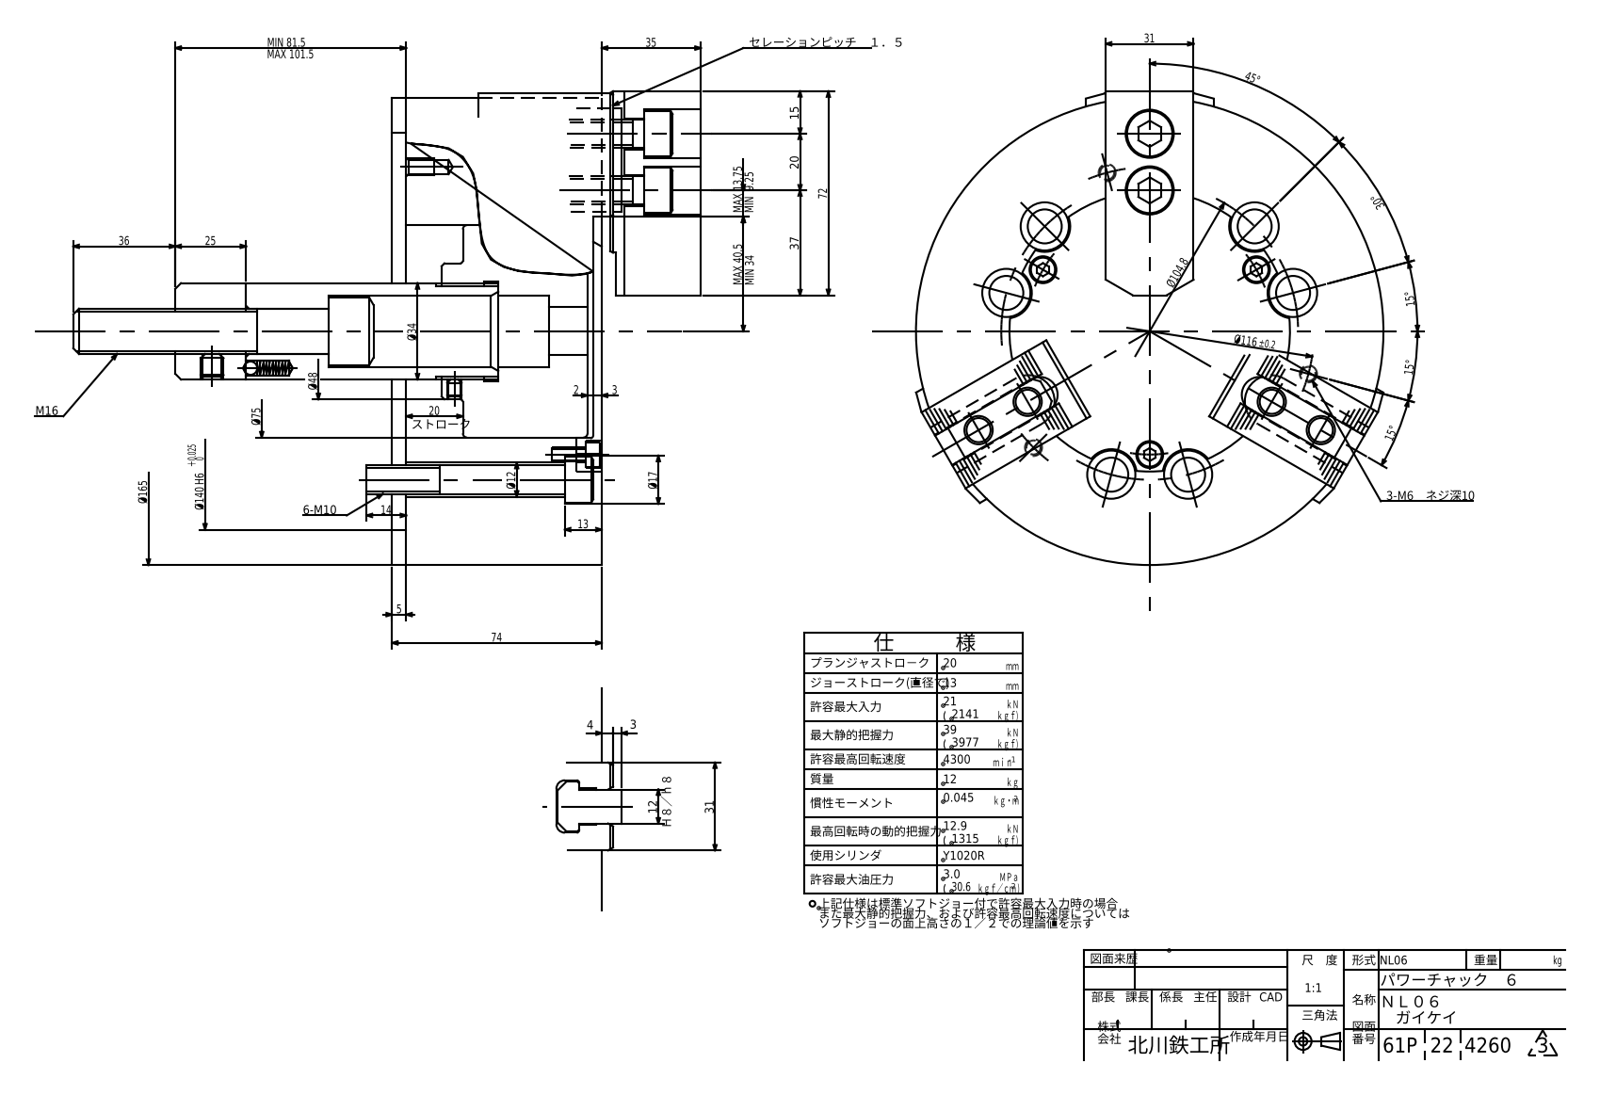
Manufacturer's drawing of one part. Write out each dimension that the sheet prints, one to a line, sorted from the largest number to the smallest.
Ø116 ±0.2
Ø104.8
MIN 81.5
74
72
45°
MAX 40.5
37
36
35
Ø34
31
31
30°
25
20
20
Ø17
15°
15°
15°
15
14
MAX 13.75
13
12
Ø12
5
4
3
3
2
